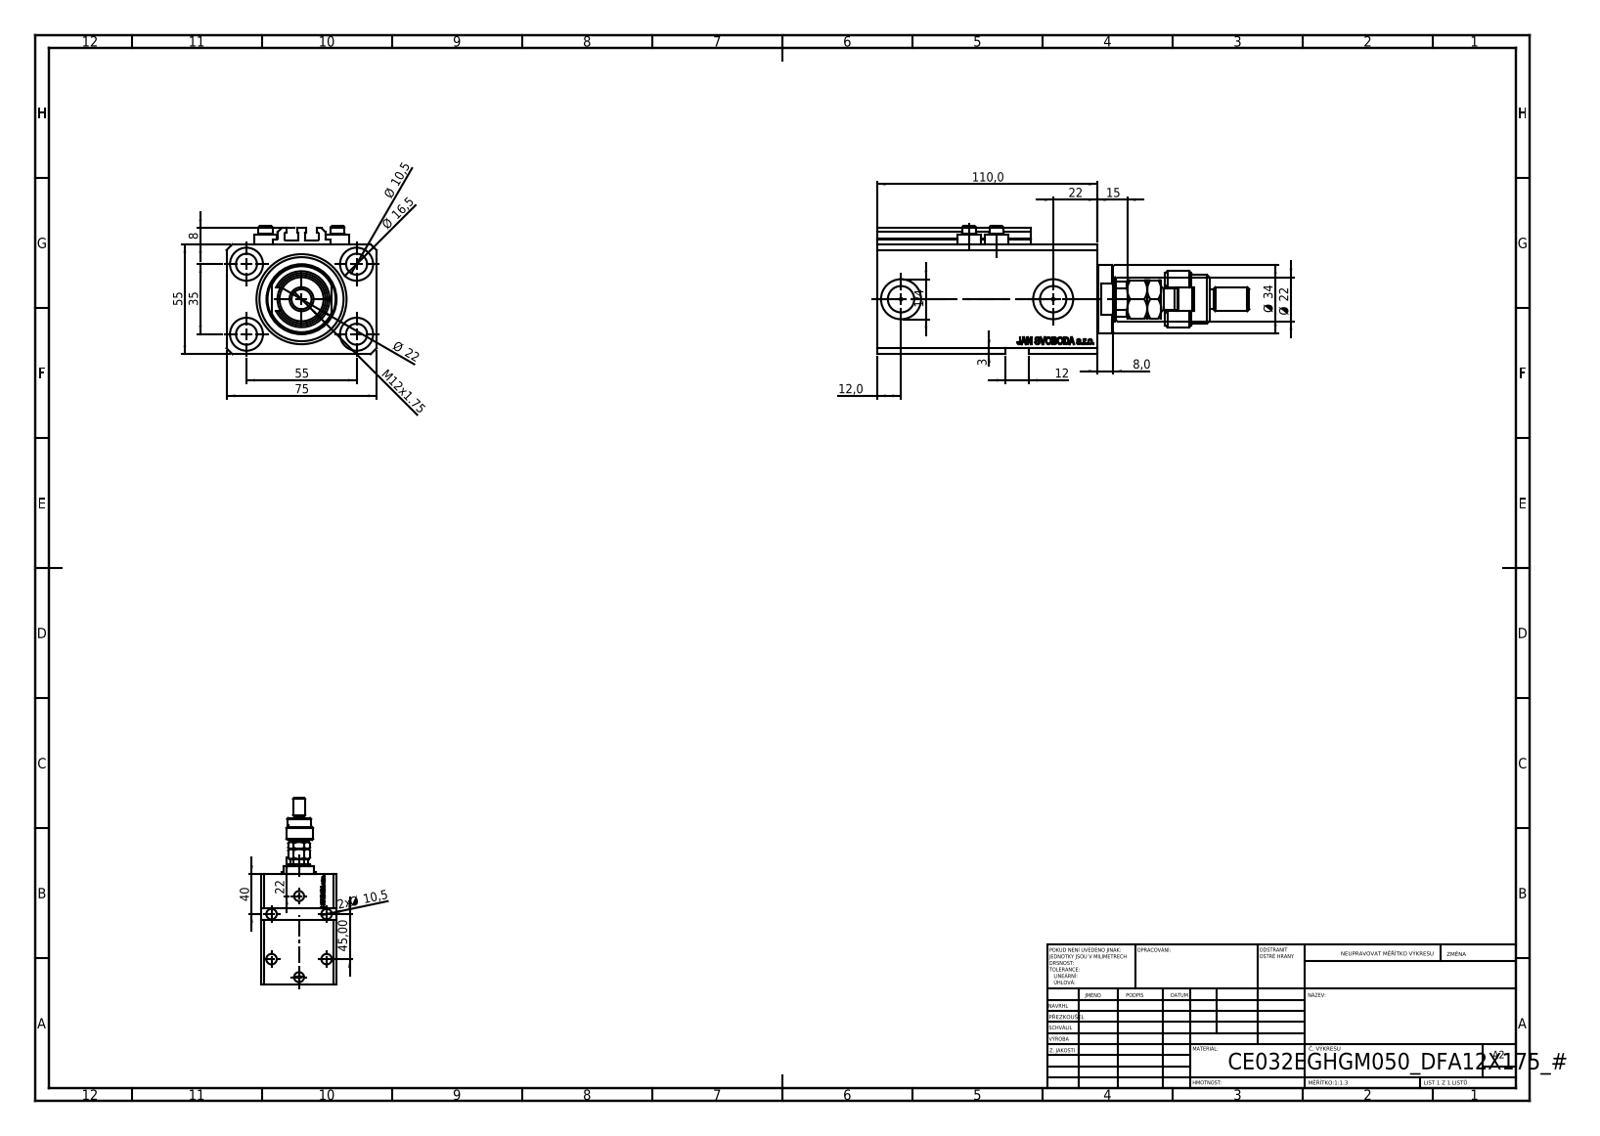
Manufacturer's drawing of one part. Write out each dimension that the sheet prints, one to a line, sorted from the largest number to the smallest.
110,0
75
55
55
45,00
40
35
Ø 34
Ø 22
22
Ø 22
22
Ø 16,5
15
M12x1.75
12,0
12
Ø 10,5
2x Ø 10,5
8
8,0
3
1/4
